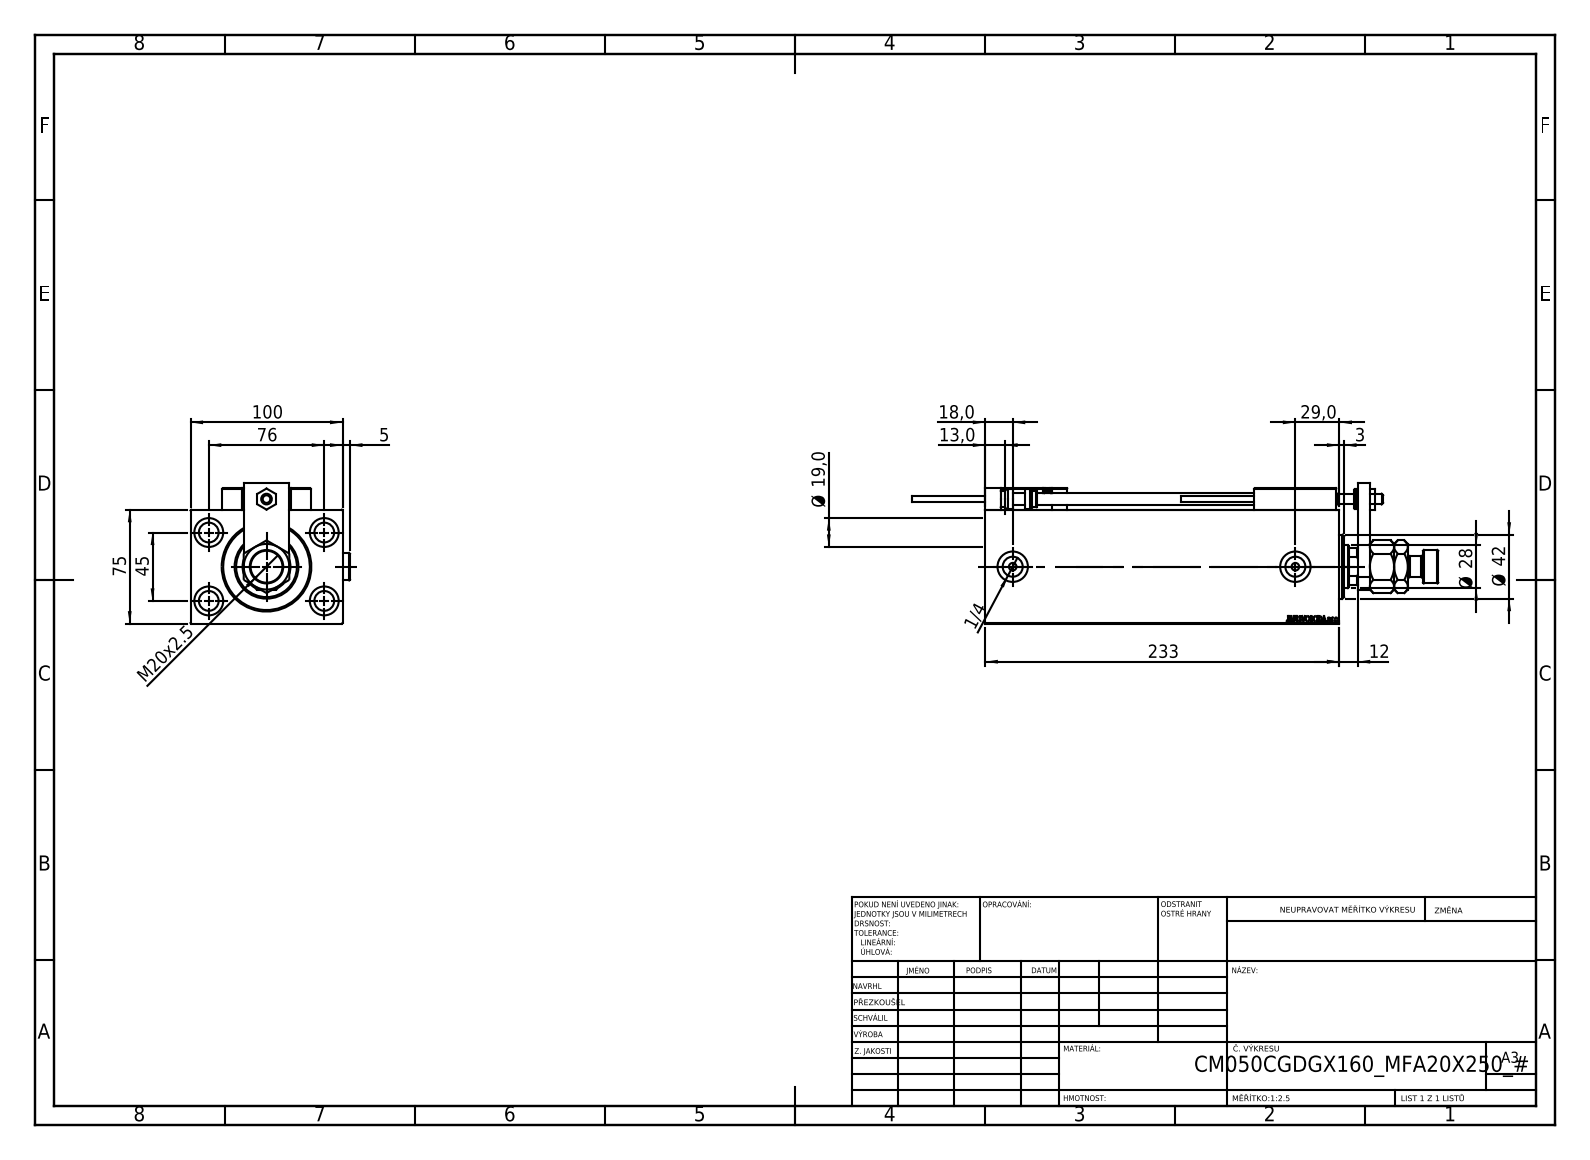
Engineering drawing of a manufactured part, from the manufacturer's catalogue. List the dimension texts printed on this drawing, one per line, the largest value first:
233
100
76
75
45
Ø 42
29,0
Ø 28
M20x2.5
Ø 19,0
18,0
13,0
12
5
3
1/4
